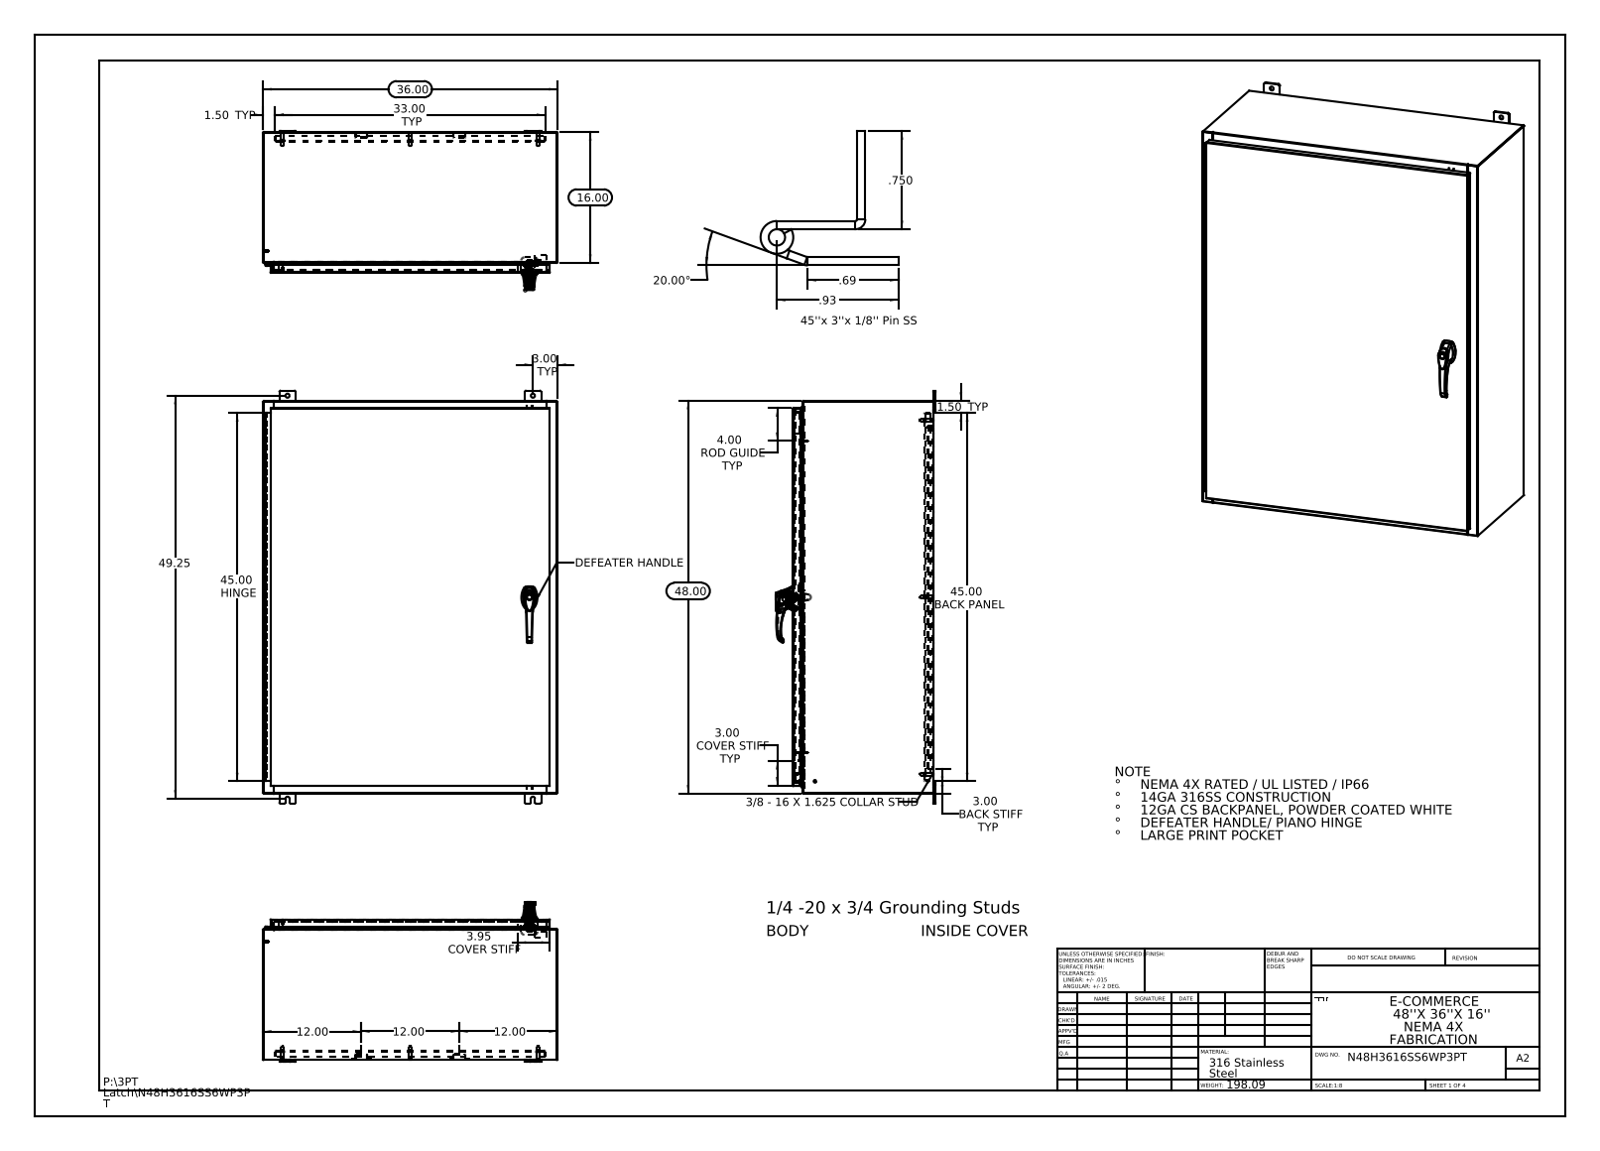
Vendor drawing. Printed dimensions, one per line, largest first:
49.25
48.00
45.00 HINGE
45.00 BACK PANEL
36.00
33.00 TYP
20.00°
16.00
12.00
12.00
12.00
4.00 ROD GUIDE TYP
3.95 COVER STIFF
3.00 TYP
3.00 BACK STIFF TYP
3.00 COVER STIFF TYP
1.50 TYP
1.50 TYP
.93
.750
.69
